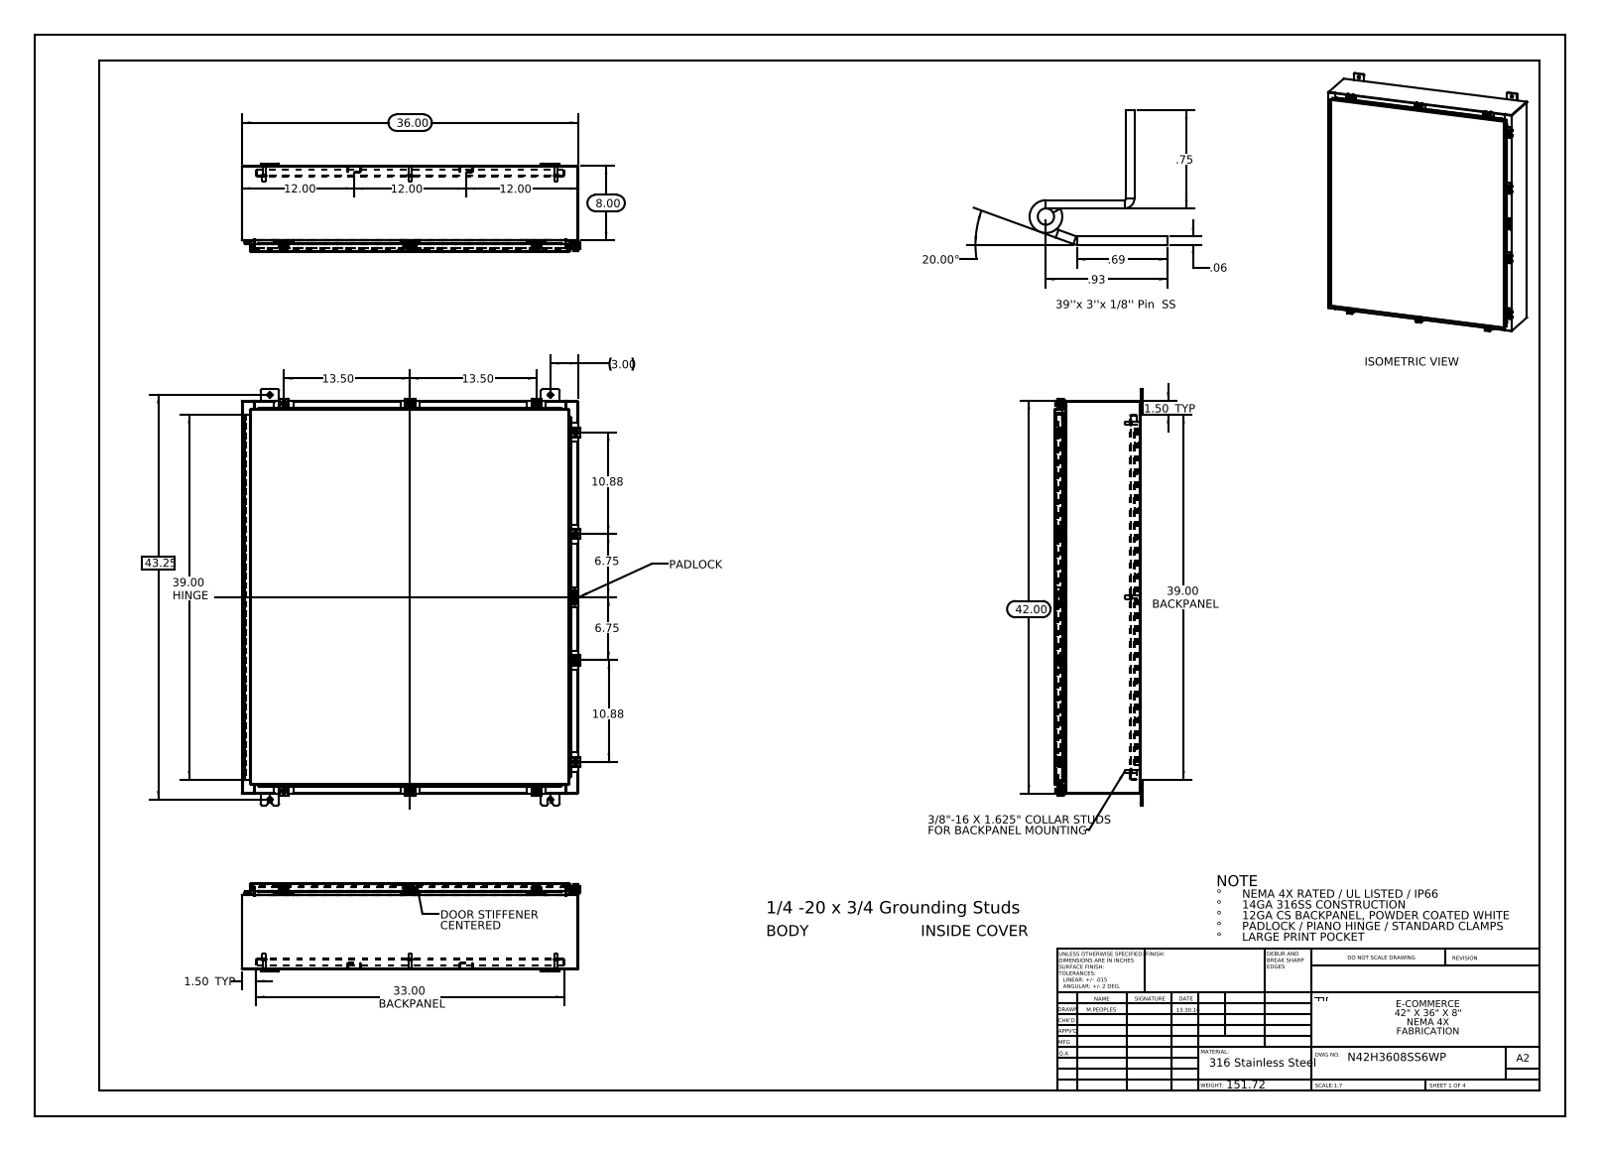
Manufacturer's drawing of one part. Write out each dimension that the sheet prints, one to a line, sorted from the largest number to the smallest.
43.25
42.00
39.00 HINGE
39.00 BACKPANEL
36.00
33.00 BACKPANEL
20.00°
13.50
13.50
12.00
12.00
12.00
10.88
10.88
8.00
6.75
6.75
3.00
1.50 TYP
1.50 TYP
.93
.75
.69
.06
